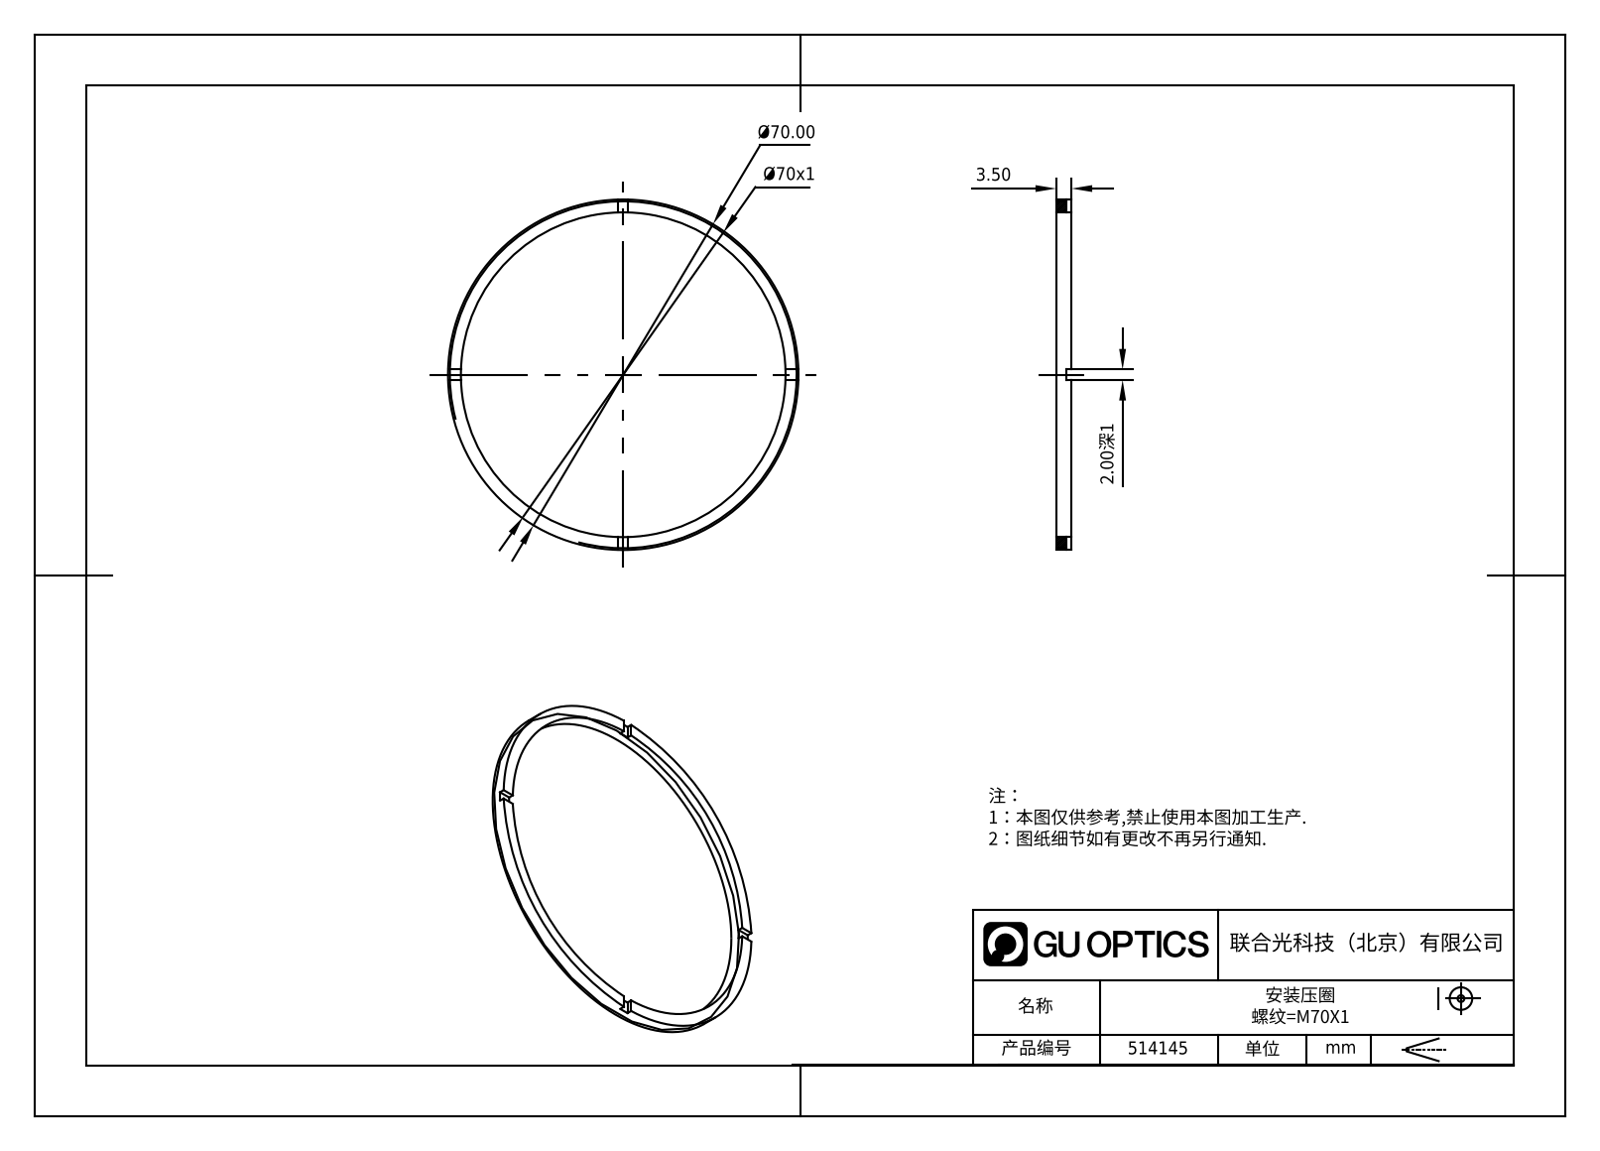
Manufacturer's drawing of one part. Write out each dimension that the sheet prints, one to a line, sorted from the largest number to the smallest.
Ø70.00
Ø70x1
3.50
2.00深1
